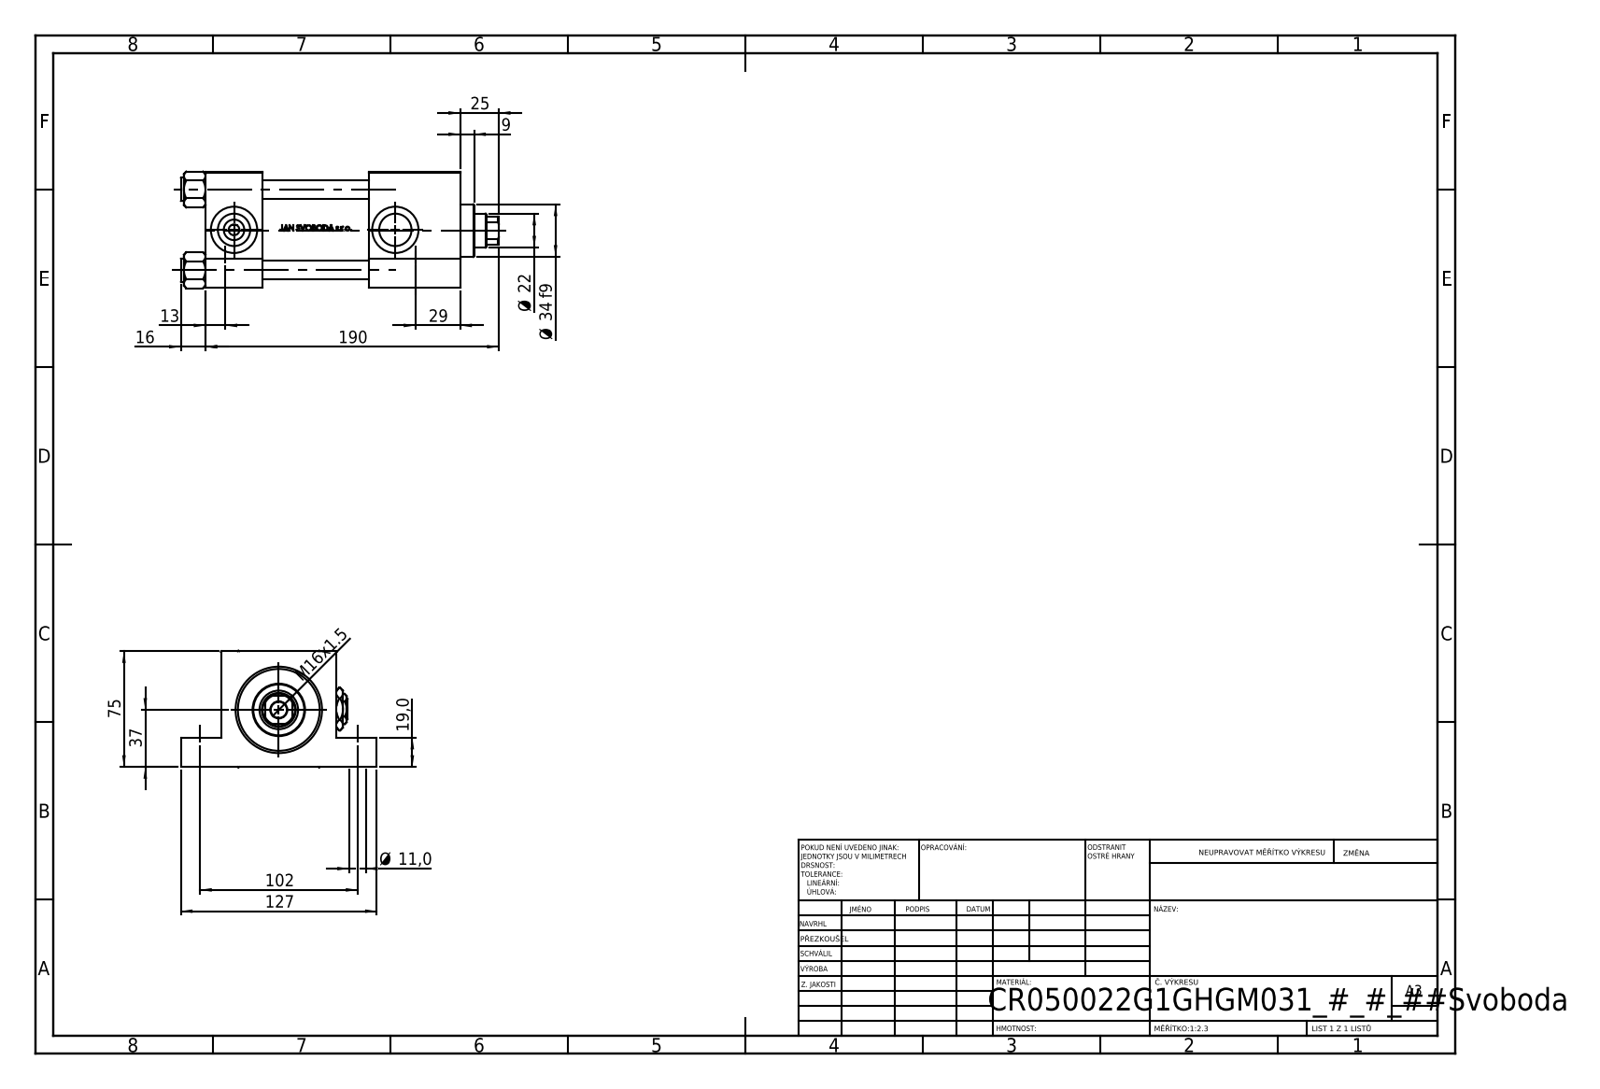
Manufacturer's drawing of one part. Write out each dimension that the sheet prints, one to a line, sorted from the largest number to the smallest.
190
127
102
75
37
Ø 34 f9
29
25
Ø 22
19,0
16
M16x1.5
13
Ø 11,0
9
